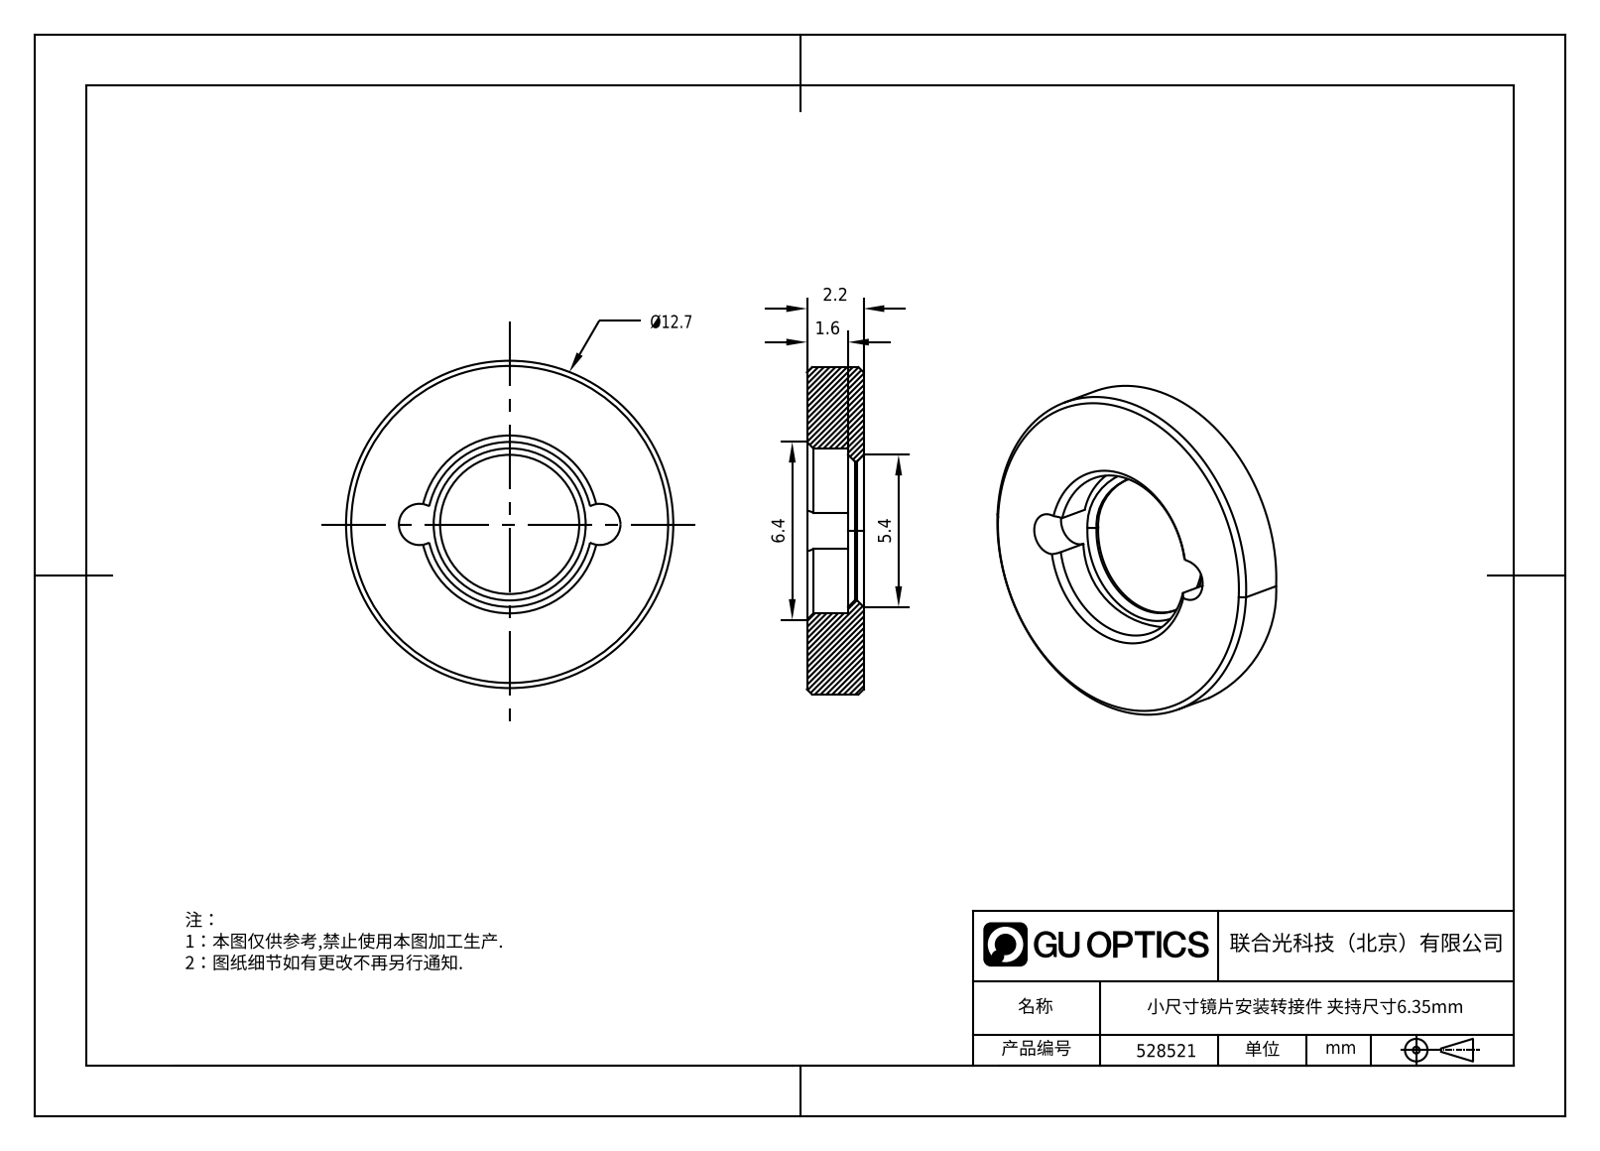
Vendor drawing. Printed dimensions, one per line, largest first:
6.4
5.4
2.2
1.6
